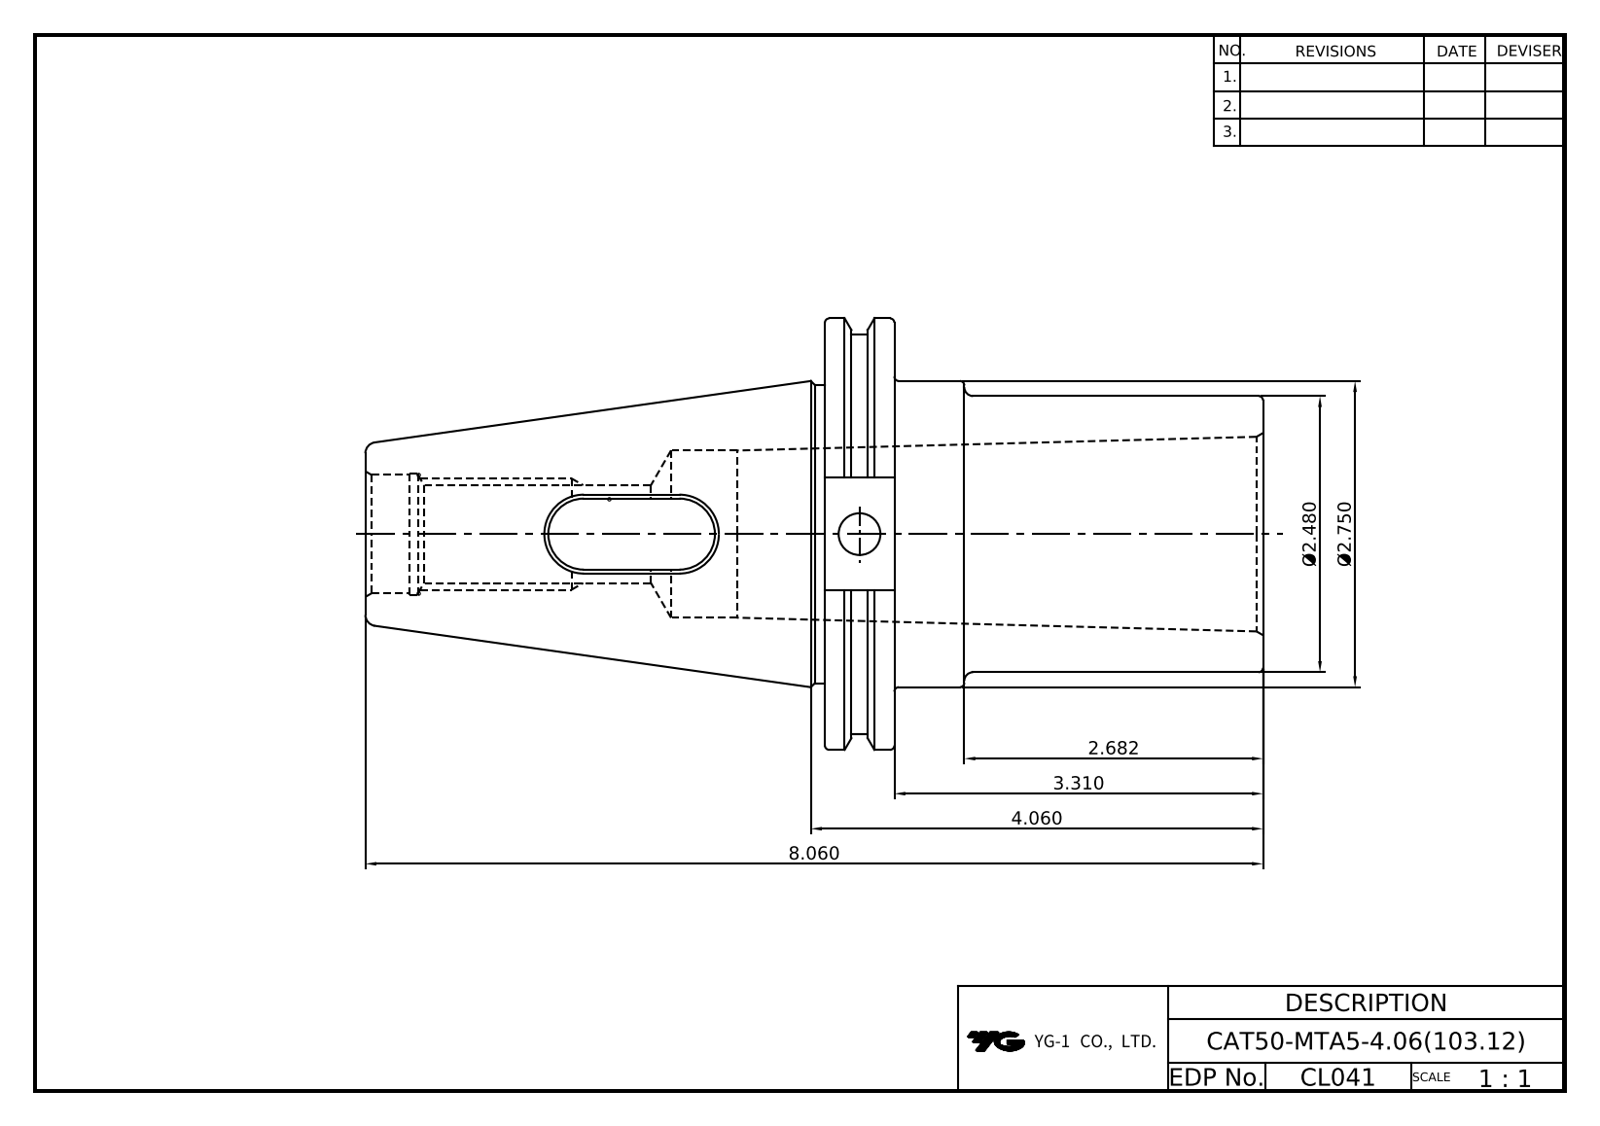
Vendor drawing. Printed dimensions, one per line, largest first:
8.060
4.060
3.310
Ø2.750
2.682
Ø2.480
